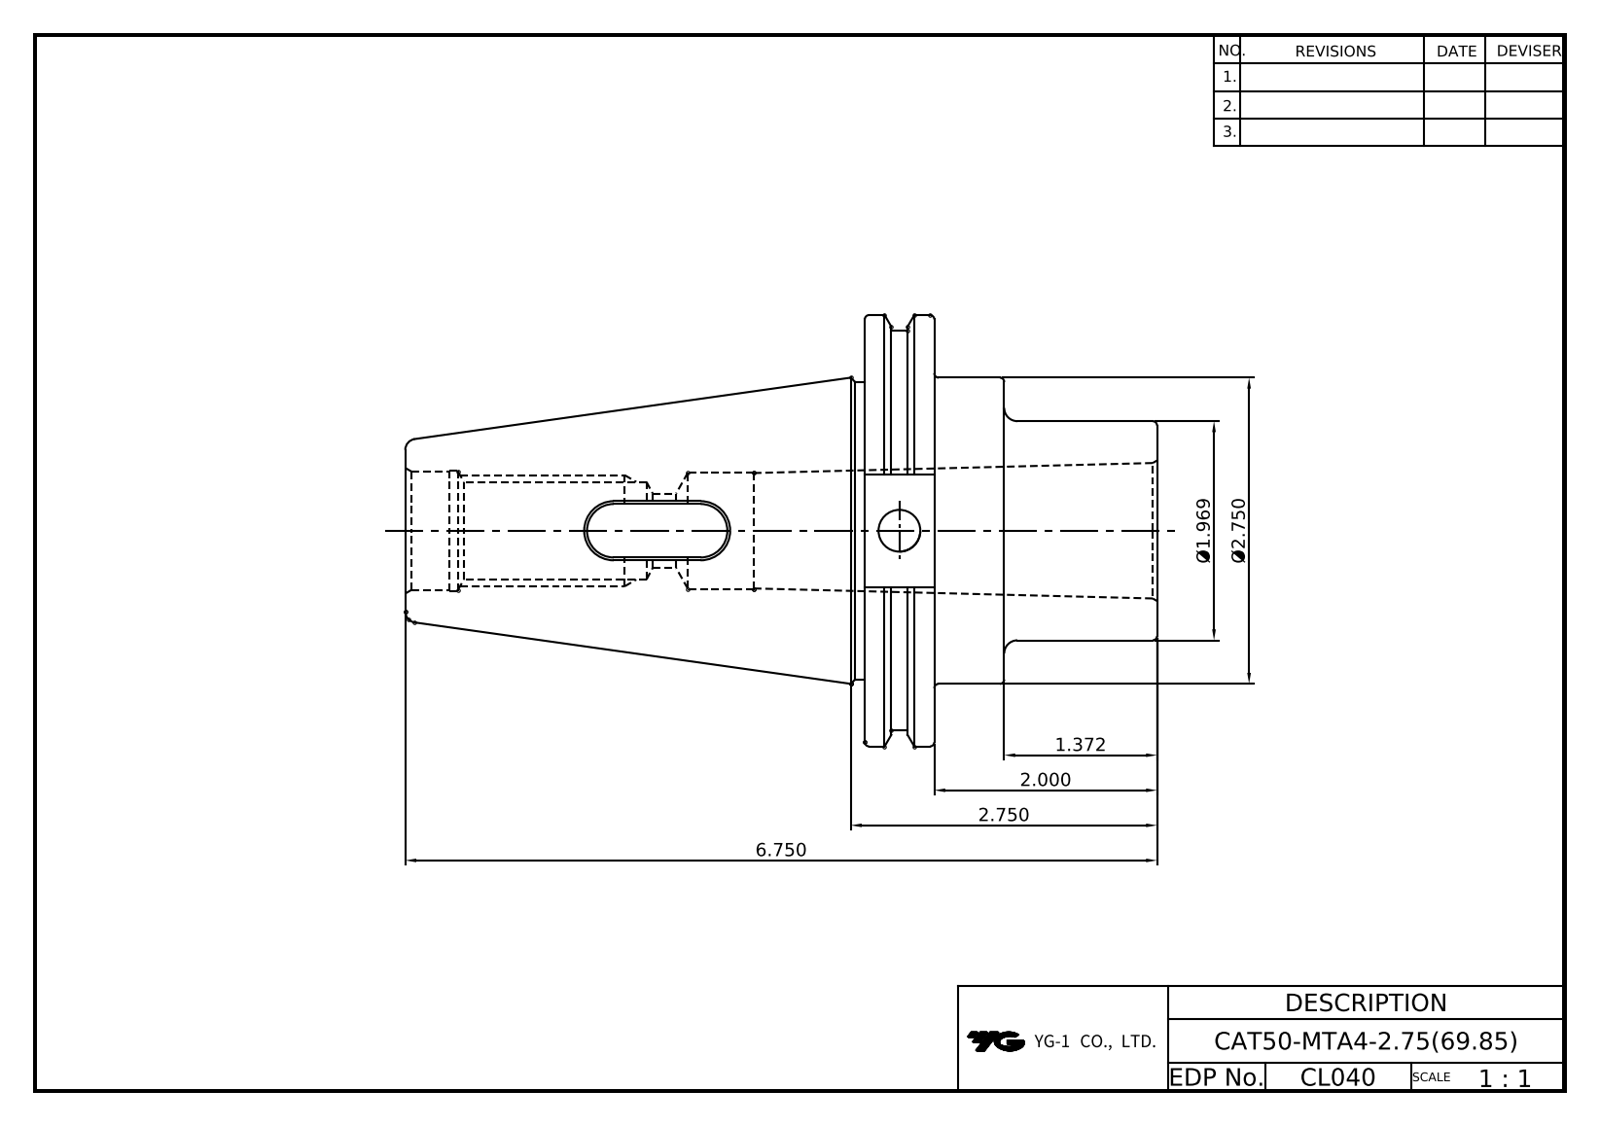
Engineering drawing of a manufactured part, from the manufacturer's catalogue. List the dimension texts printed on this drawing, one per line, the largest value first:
6.750
Ø2.750
2.750
2.000
Ø1.969
1.372
